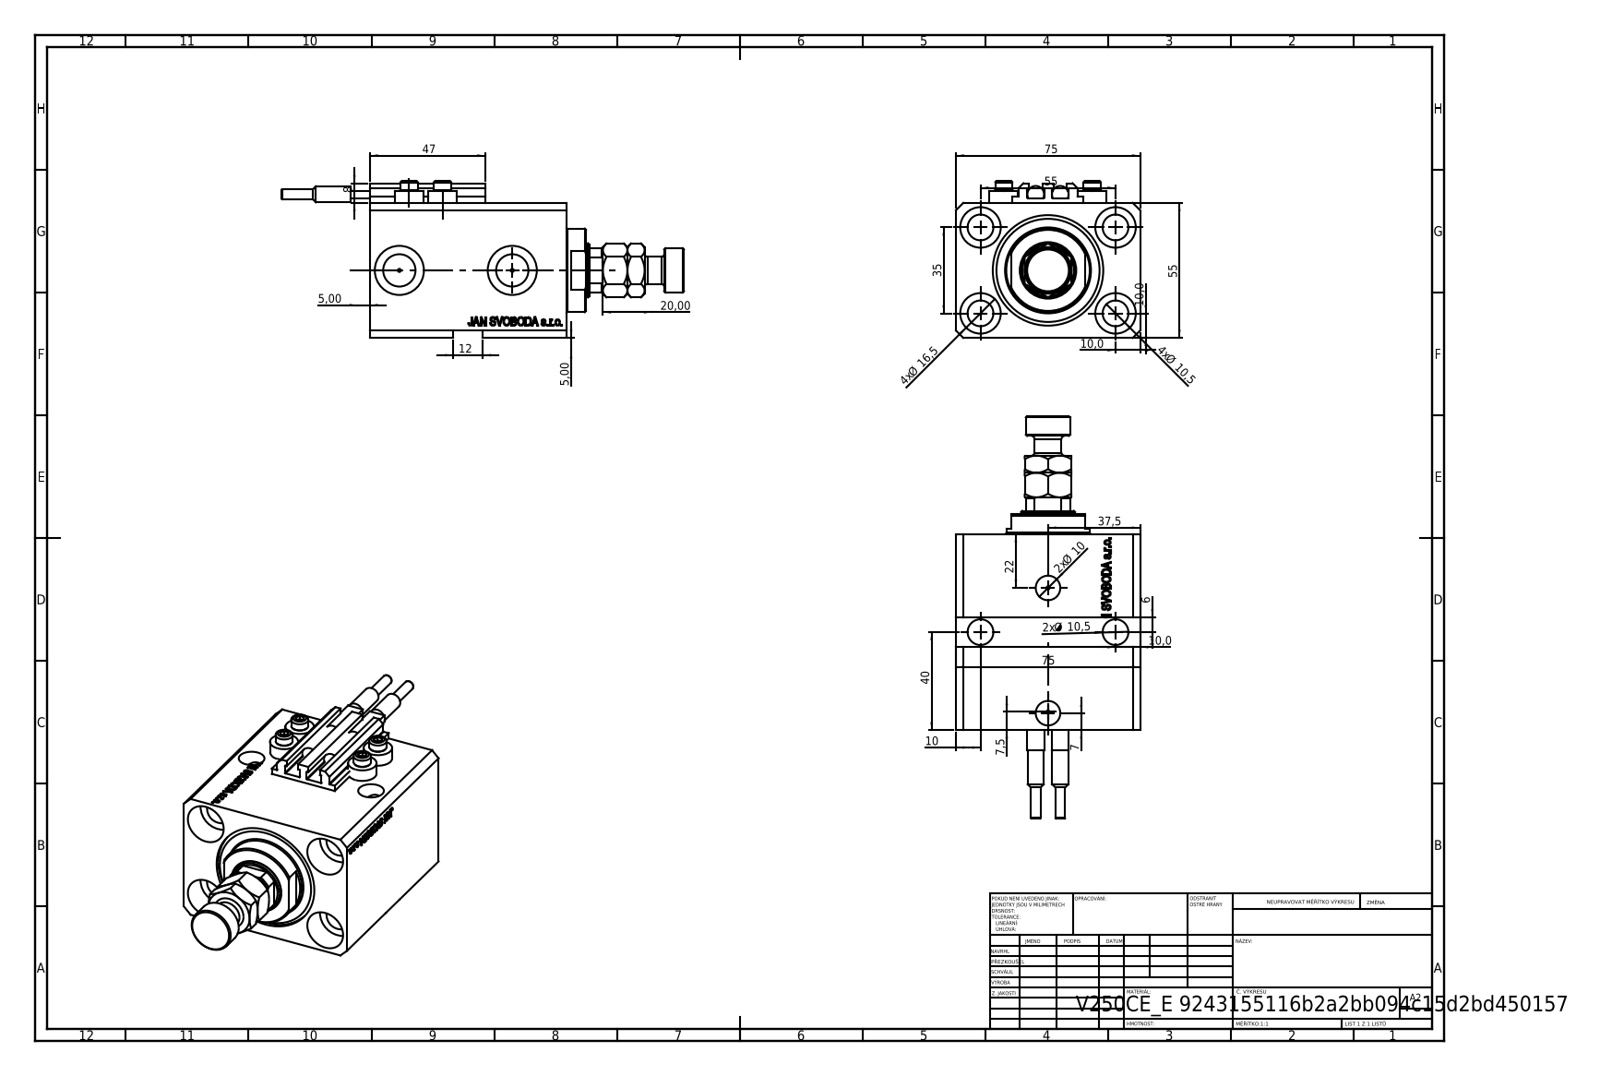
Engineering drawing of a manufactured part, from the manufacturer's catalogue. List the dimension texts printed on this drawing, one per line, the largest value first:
75
75
55
55
47
40
37,5
35
22
20,00
4x Ø 16,5
12
4x Ø 10,5
2x Ø 10,5
10,0
10,0
2x Ø 10
10,0
10
8
7,5
7
6
5,00
5,00
